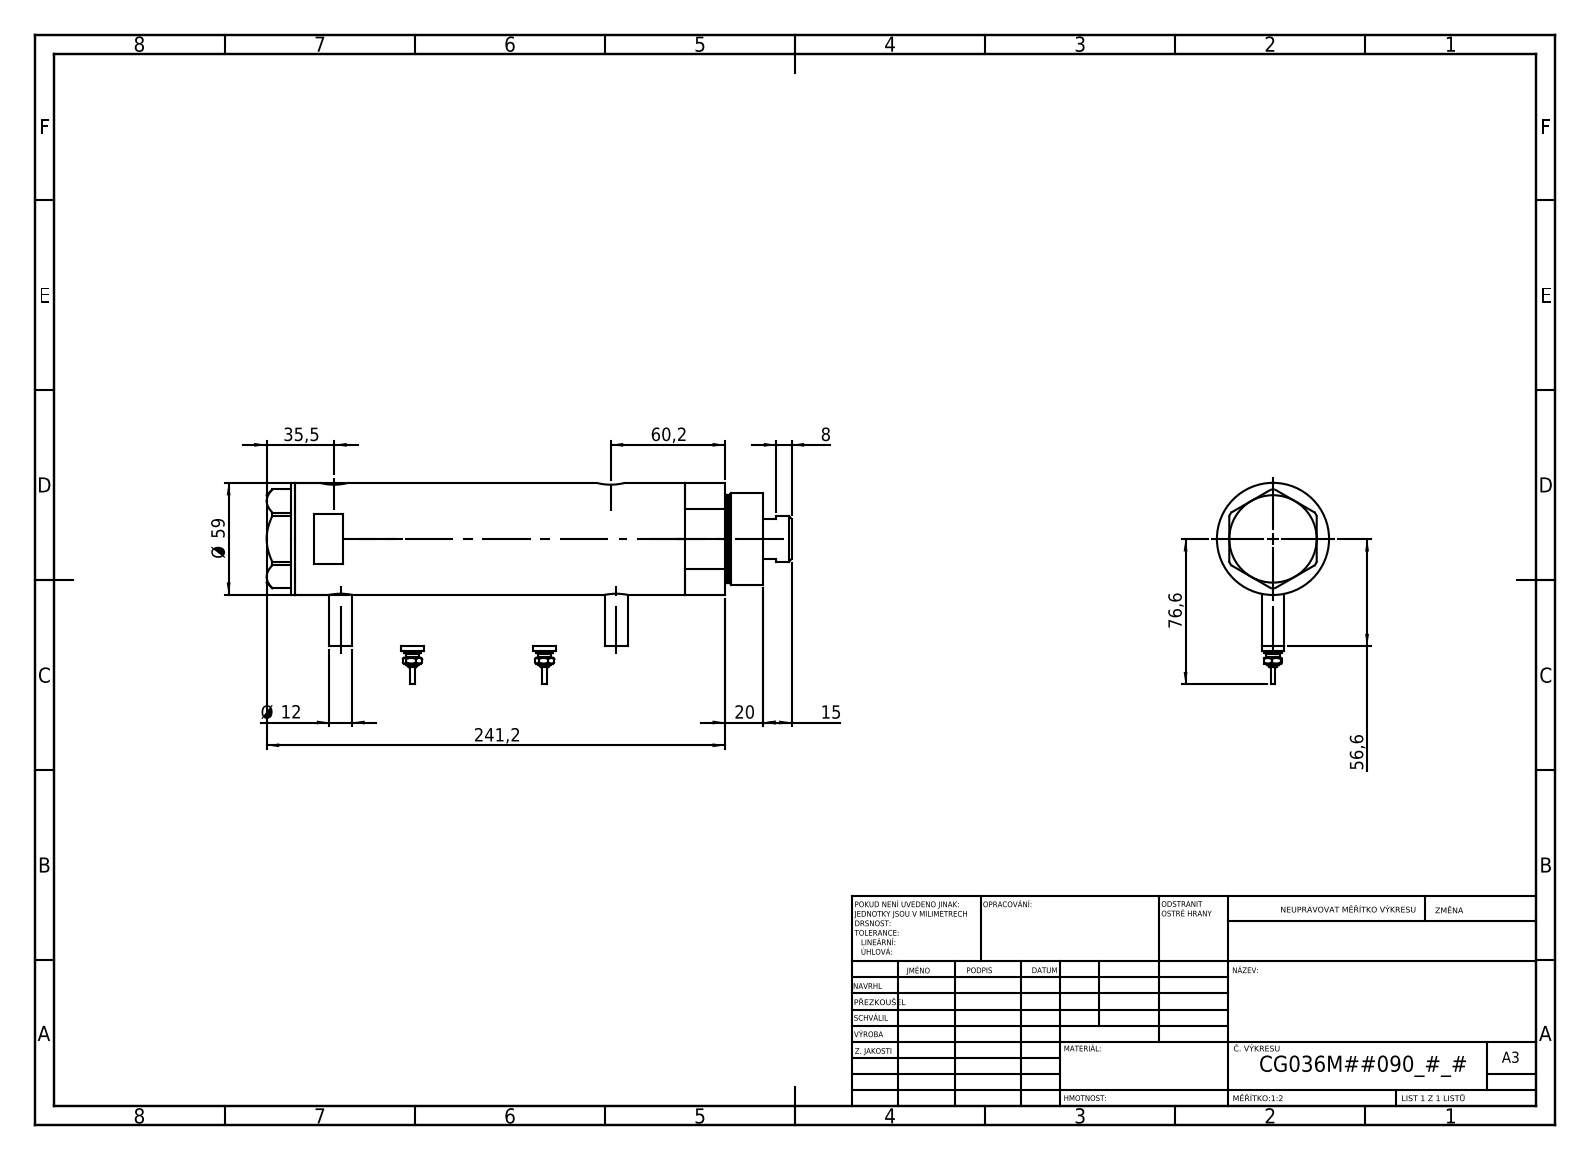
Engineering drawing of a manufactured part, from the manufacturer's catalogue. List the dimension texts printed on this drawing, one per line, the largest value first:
241,2
76,6
60,2
Ø 59
56,6
35,5
20
15
Ø 12
8
